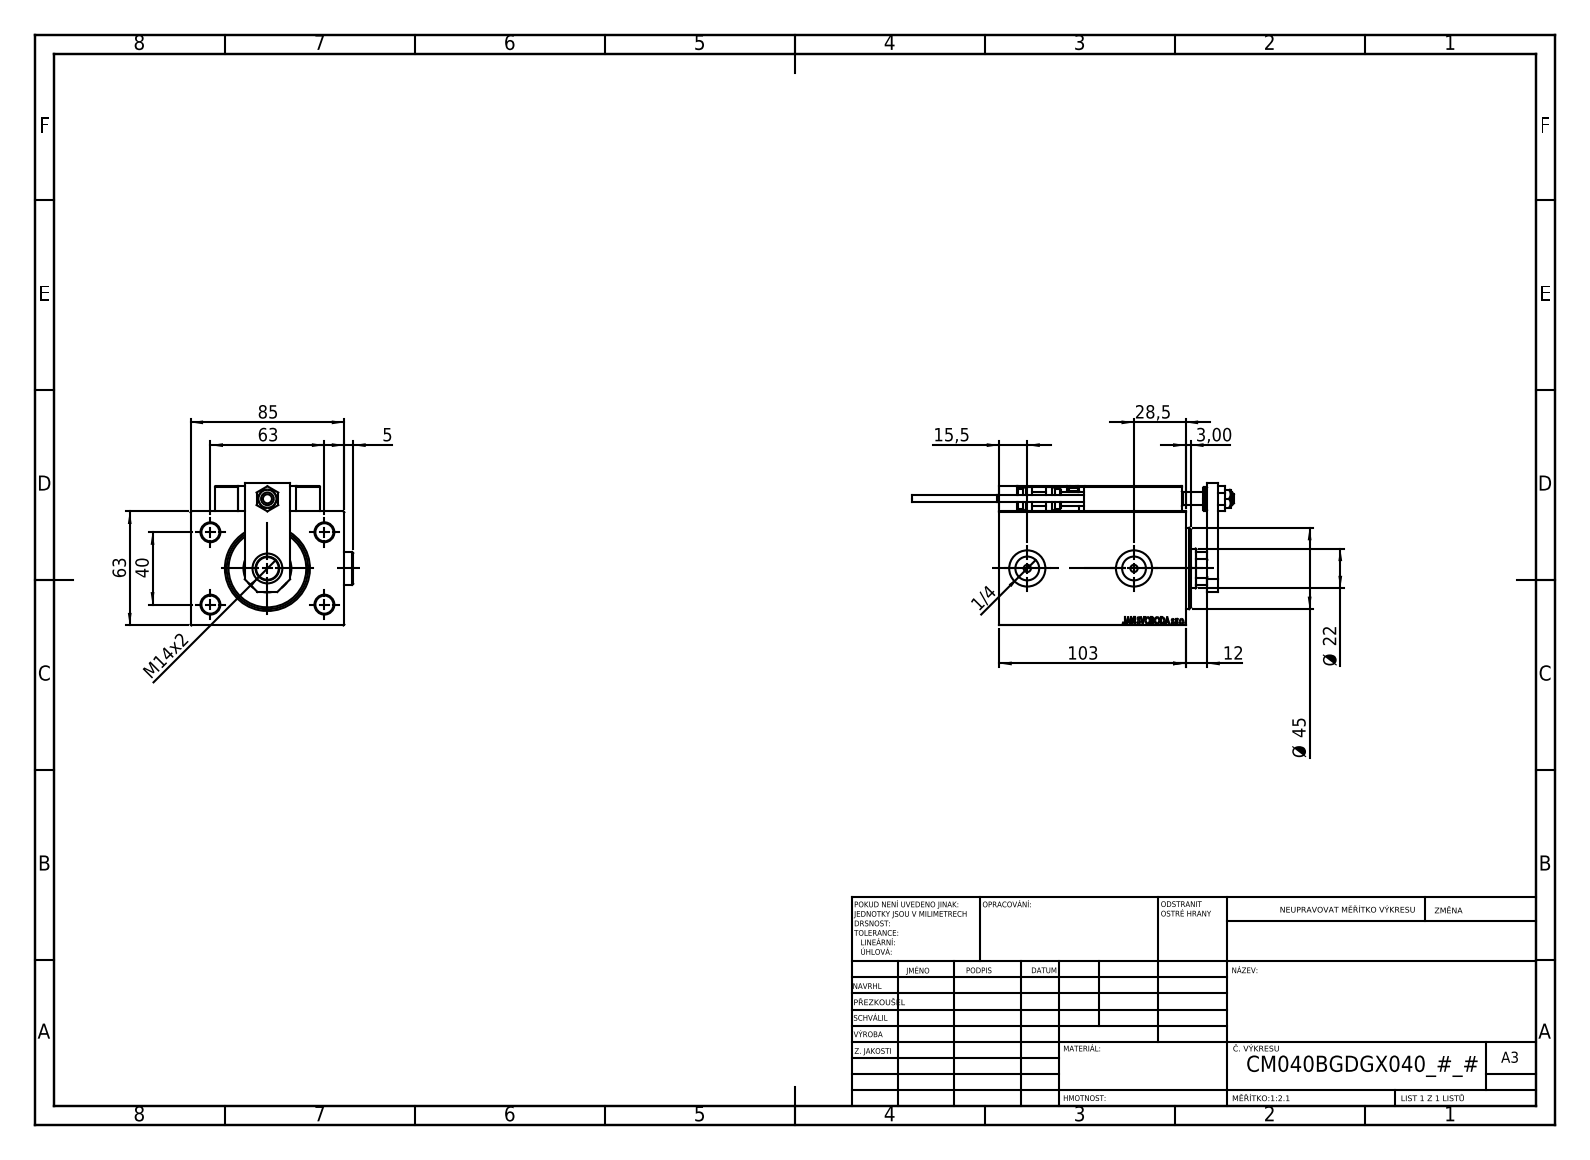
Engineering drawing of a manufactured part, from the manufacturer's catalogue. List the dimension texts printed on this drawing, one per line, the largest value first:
103
85
63
63
Ø 45
40
28,5
Ø 22
15,5
M14x2
12
5
3,00
1/4
